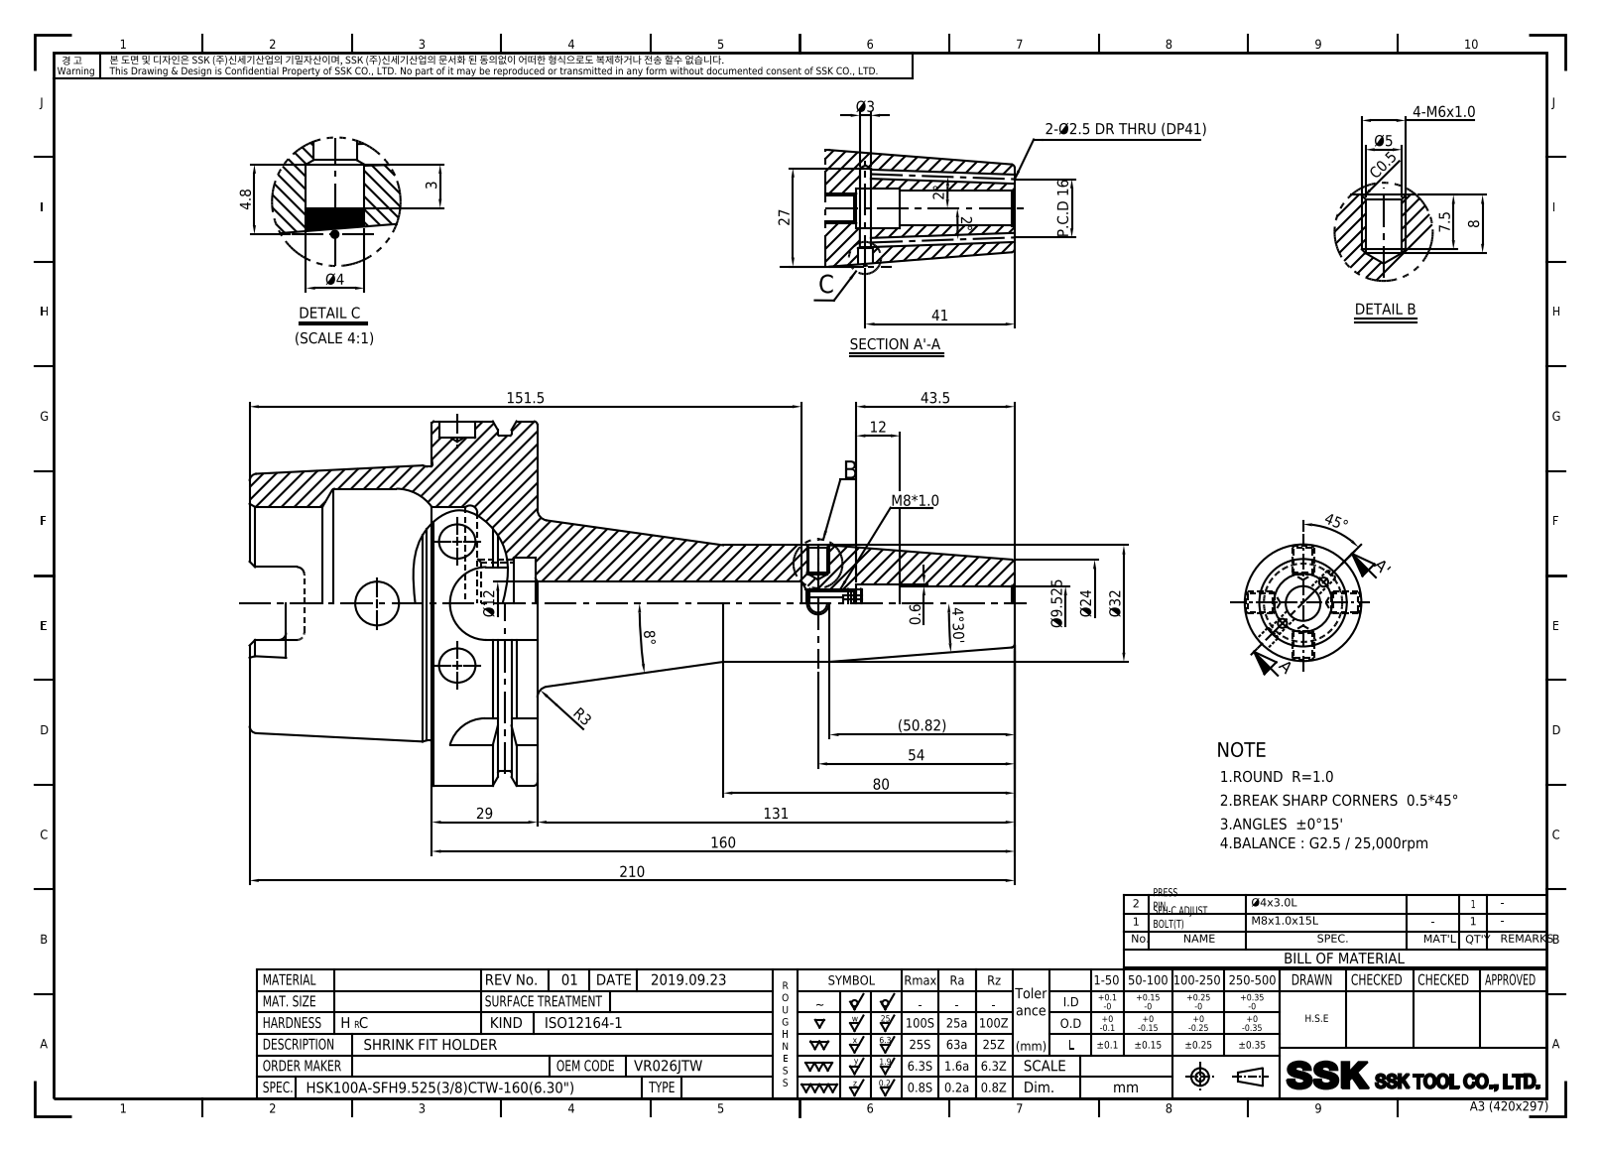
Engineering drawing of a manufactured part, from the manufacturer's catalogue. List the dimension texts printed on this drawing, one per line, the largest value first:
210
160
151.5
131
80
54
(50.82)
45°
43.5
41
Ø32
29
27
Ø24
P.C.D 16
12
Ø12
Ø9.525
8°
8
7.5
4-M6x1.0
Ø5
4.8
Ø4
4°30'
R3
3
Ø3
2°
2°
0.6
C0.5
